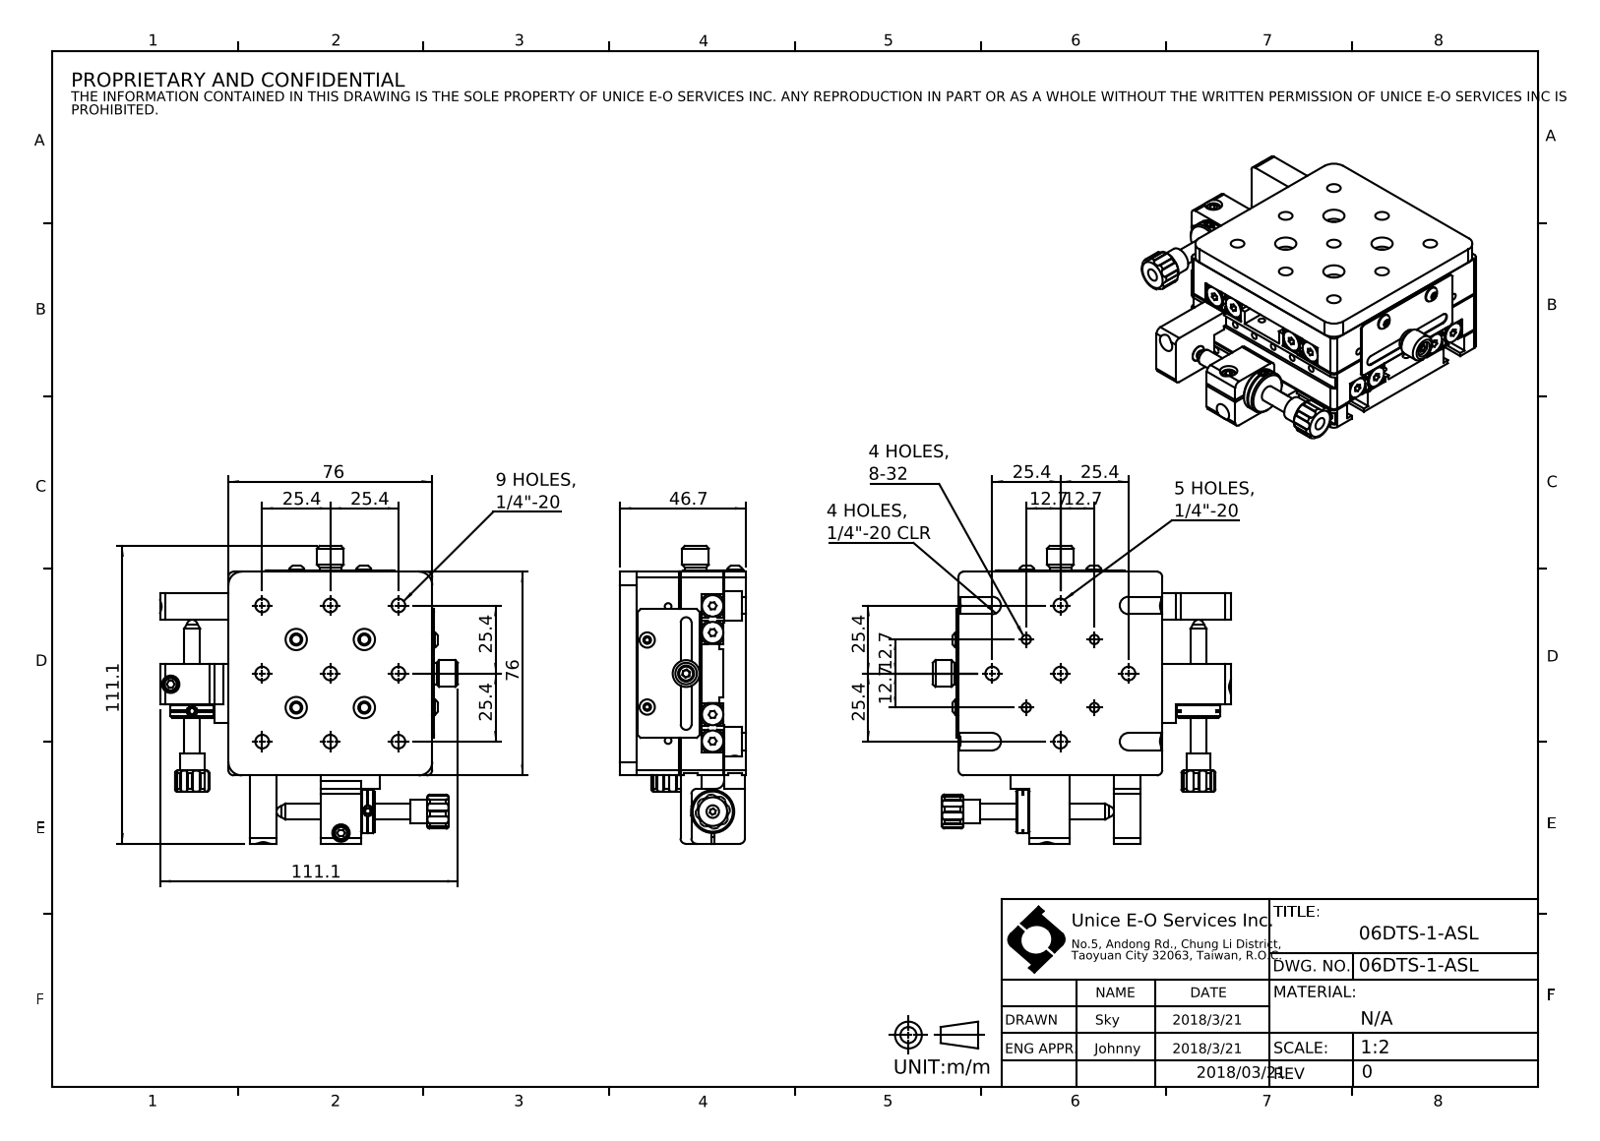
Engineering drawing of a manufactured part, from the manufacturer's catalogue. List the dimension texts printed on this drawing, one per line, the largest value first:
111.1
111.1
76
76
46.7
25.4
25.4
25.4
25.4
25.4
25.4
25.4
25.4
12.7
12.7
12.7
12.7
